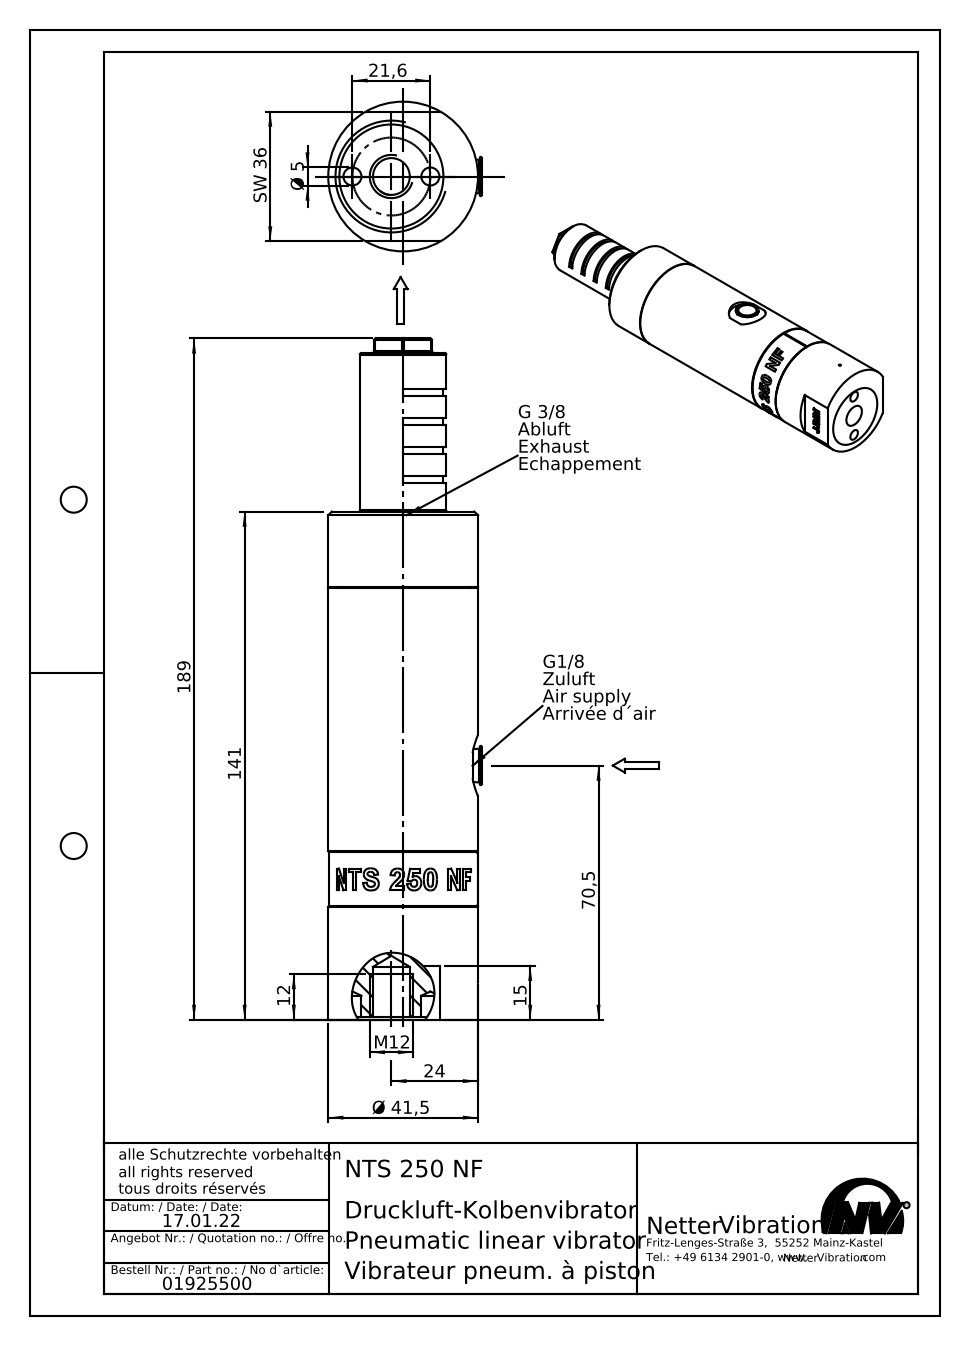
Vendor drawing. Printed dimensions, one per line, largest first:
189
141
70,5
Ø 41,5
SW 36
24
21,6
15
12
M 12
Ø 5
